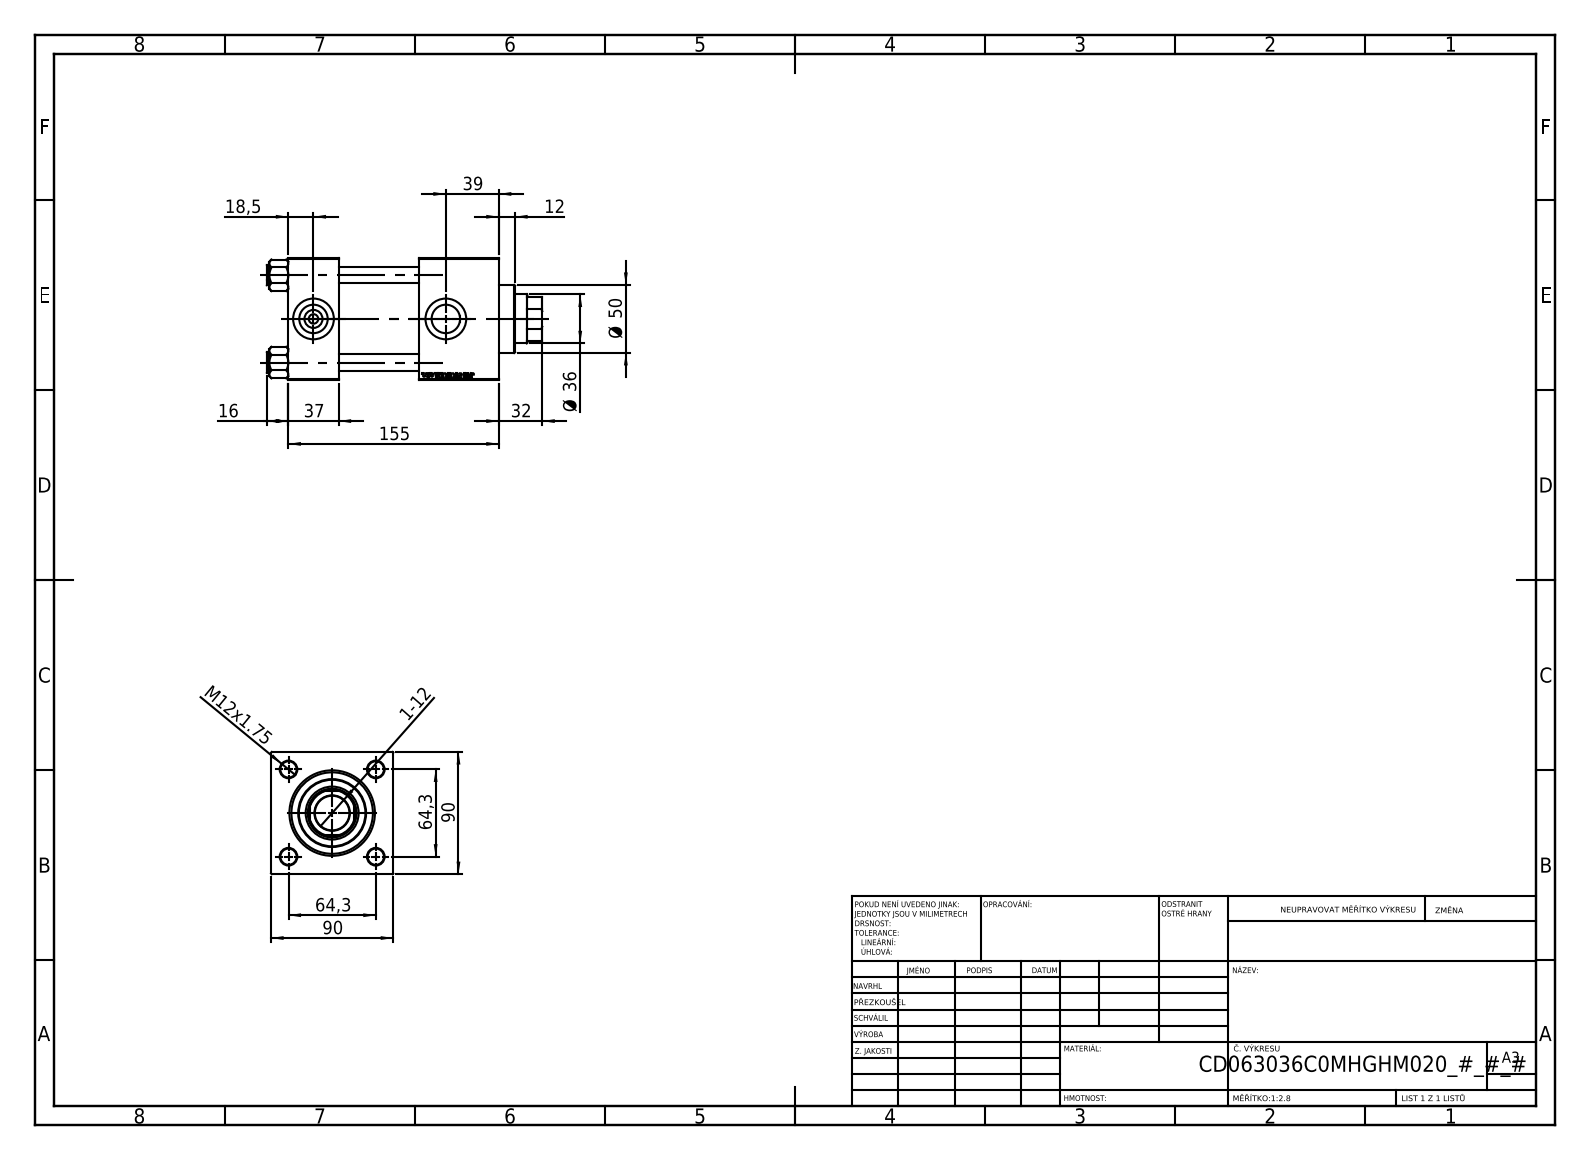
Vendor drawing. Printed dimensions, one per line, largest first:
155
90
90
64,3
64,3
Ø 50
39
37
Ø 36
32
18,5
16
12
M12x1.75
1-12
